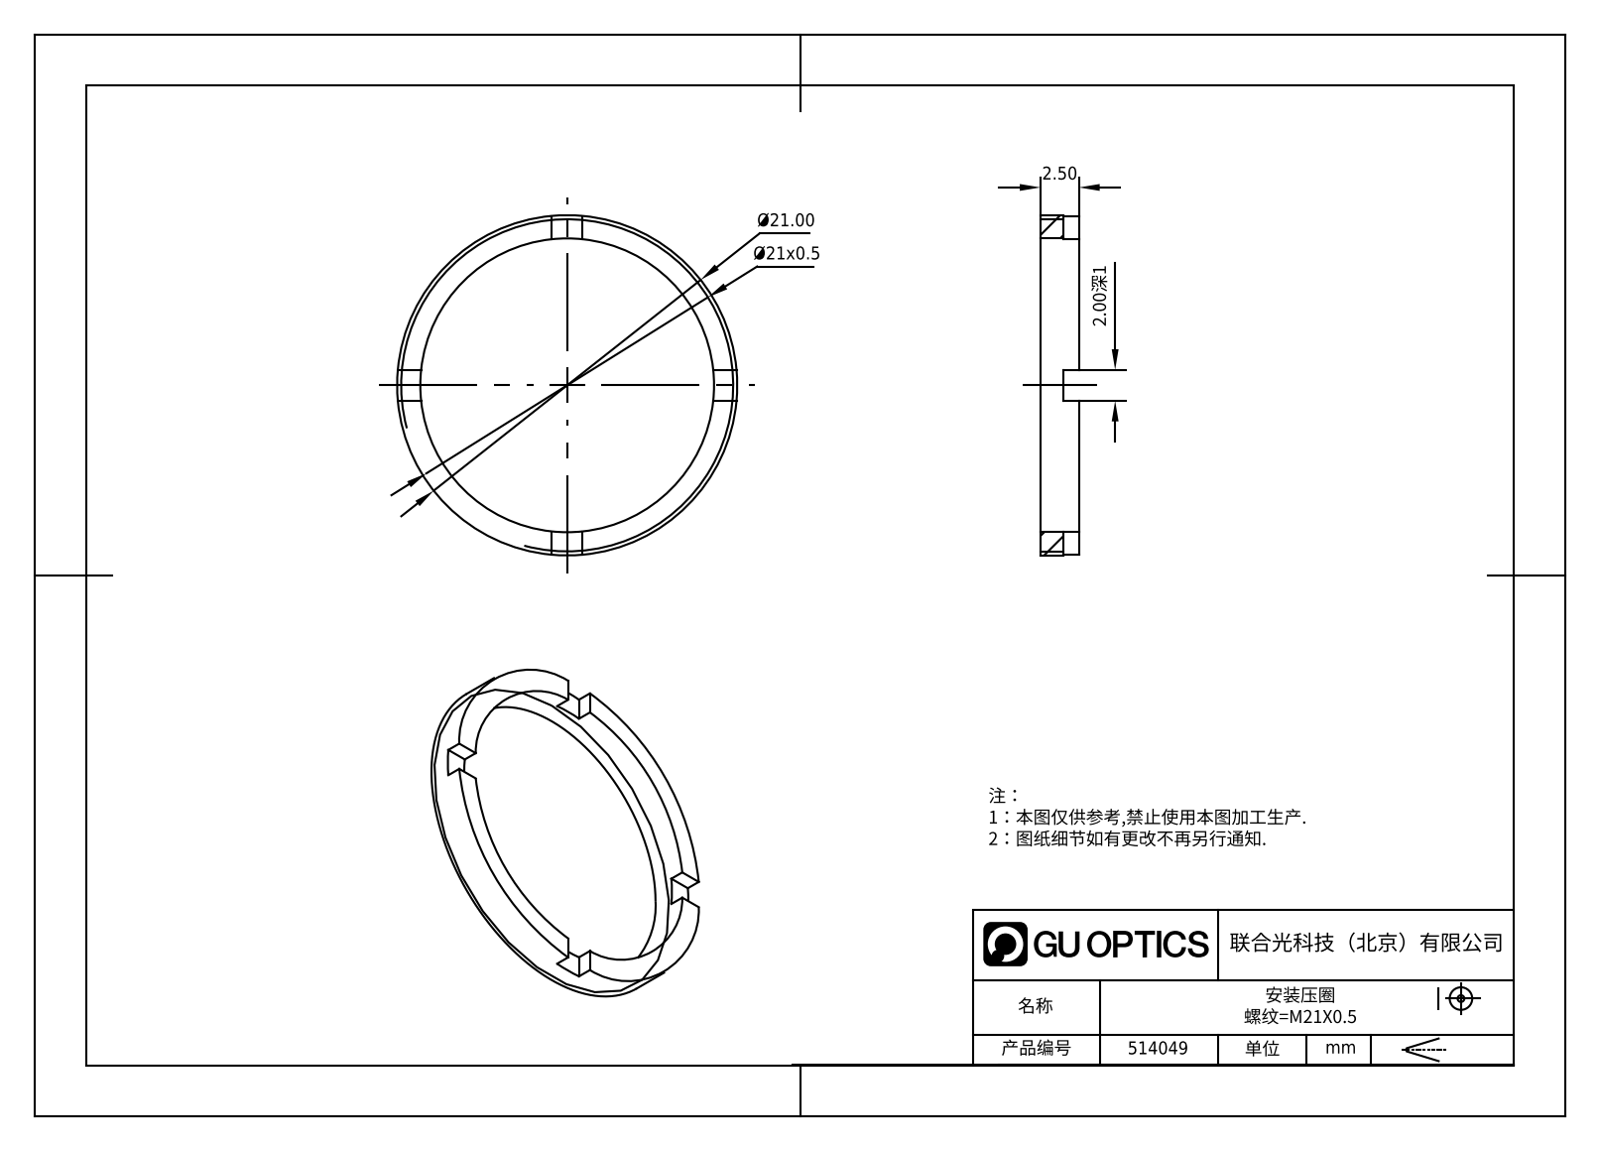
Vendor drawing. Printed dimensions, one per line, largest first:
Ø21.00
Ø21x0.5
2.50
2.00深1
